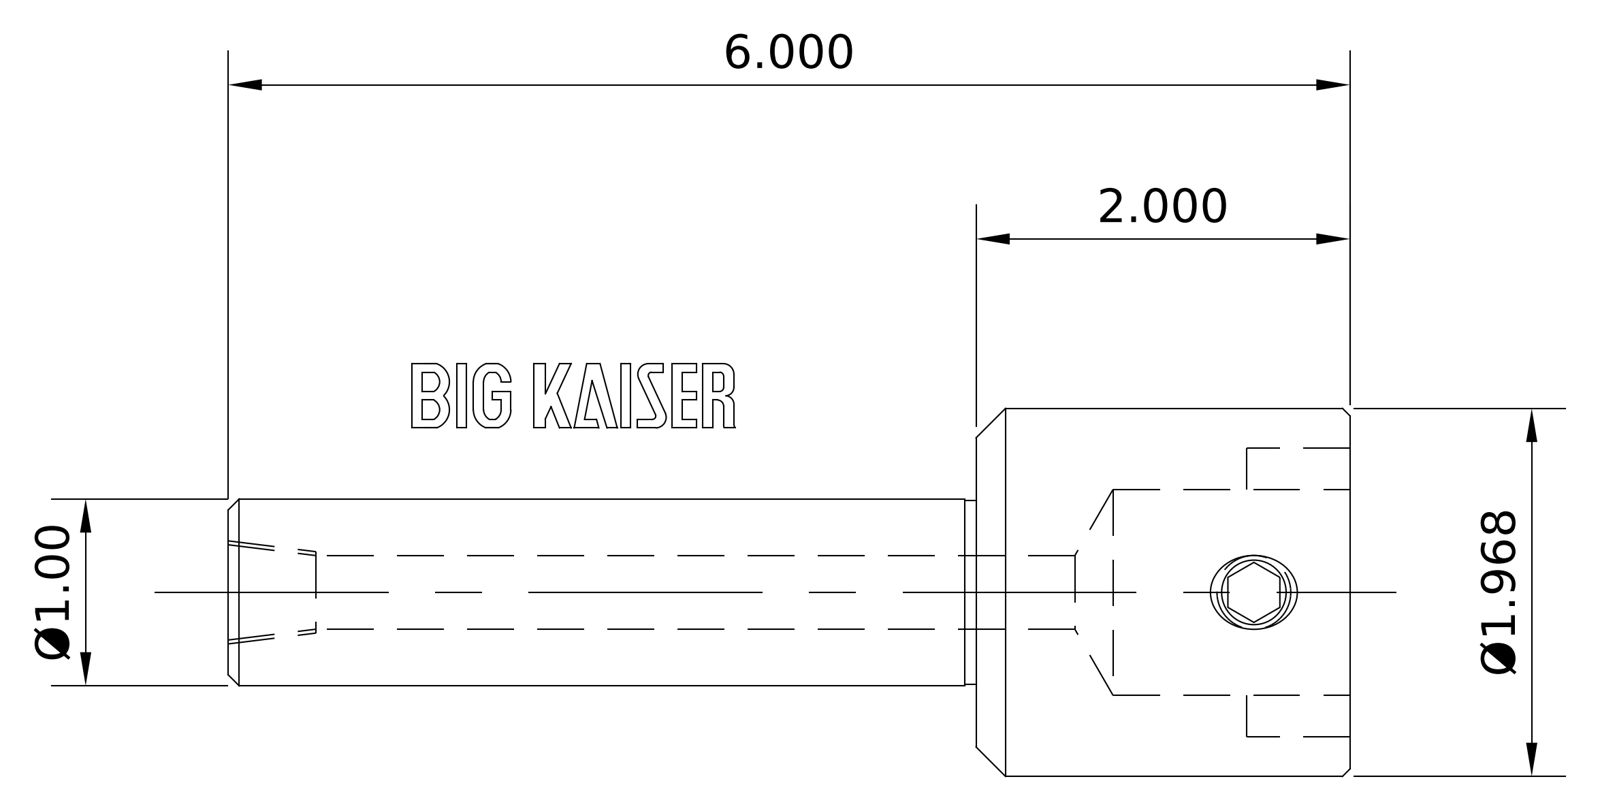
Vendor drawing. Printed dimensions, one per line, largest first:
6.000
2.000
Ø1.968
Ø1.00
